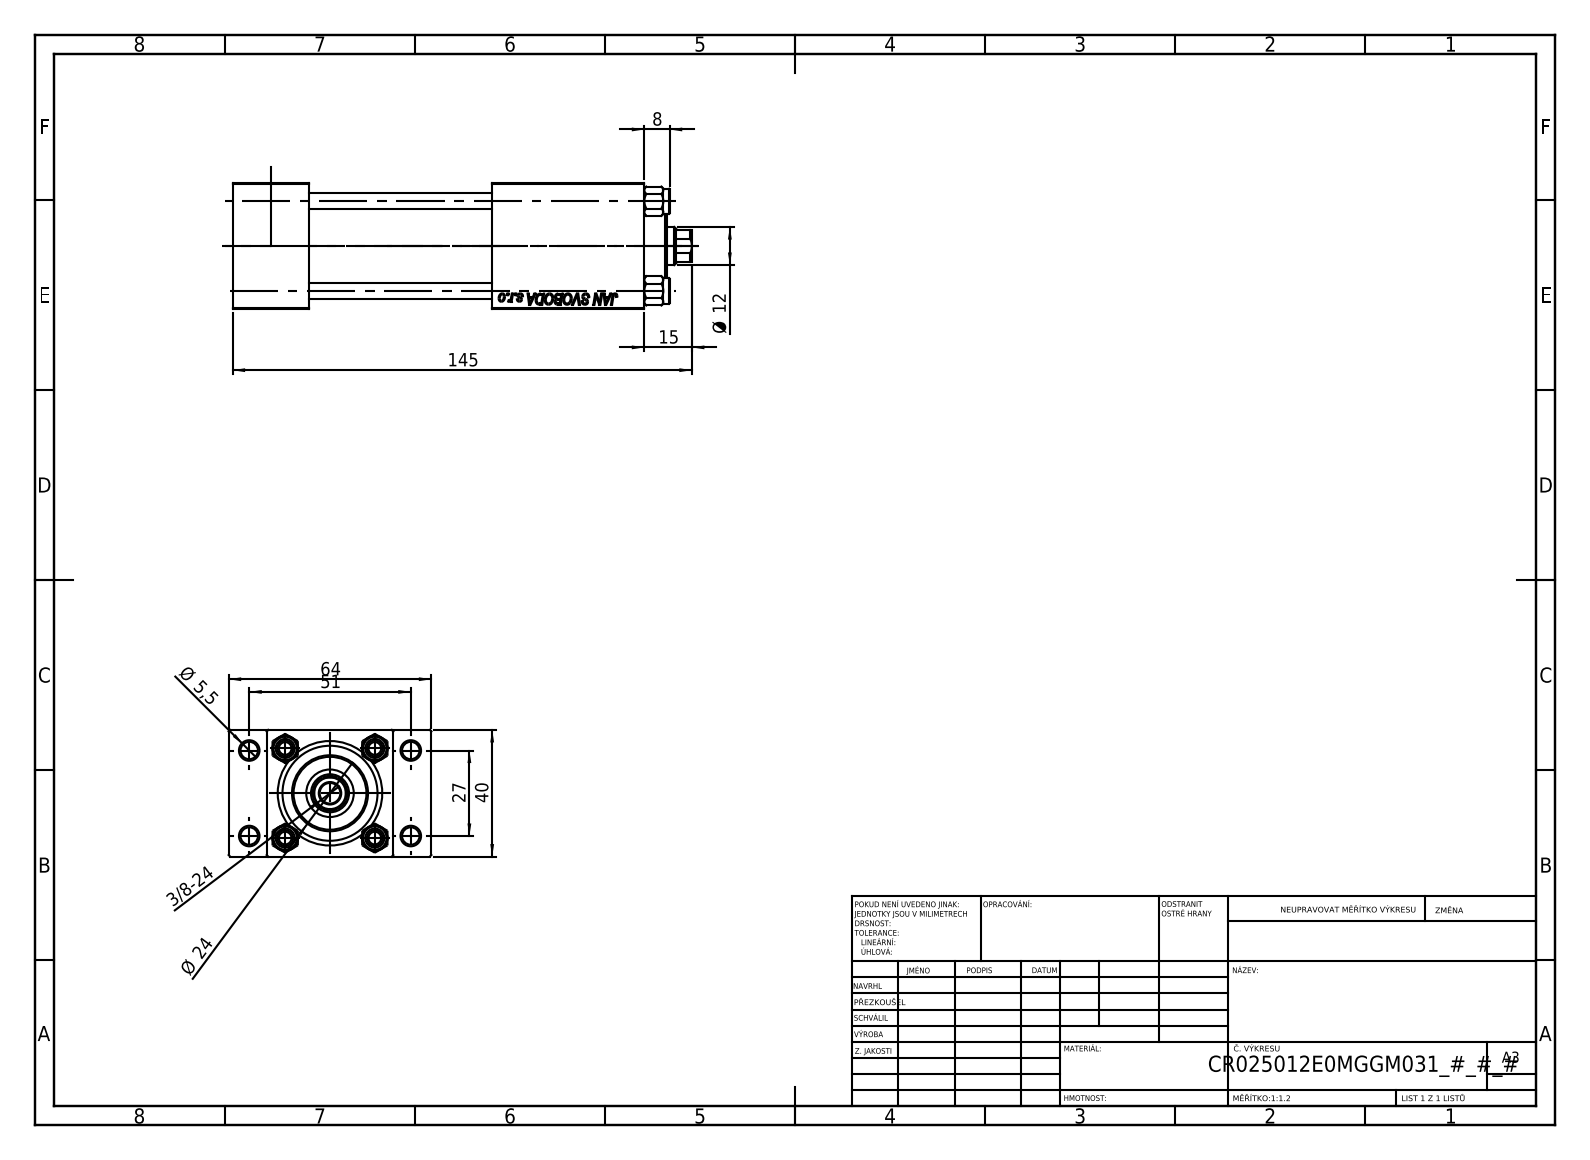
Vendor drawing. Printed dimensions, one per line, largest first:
145
64
51
40
27
Ø 24
15
Ø 12
8
Ø 5,5
3/8-24
